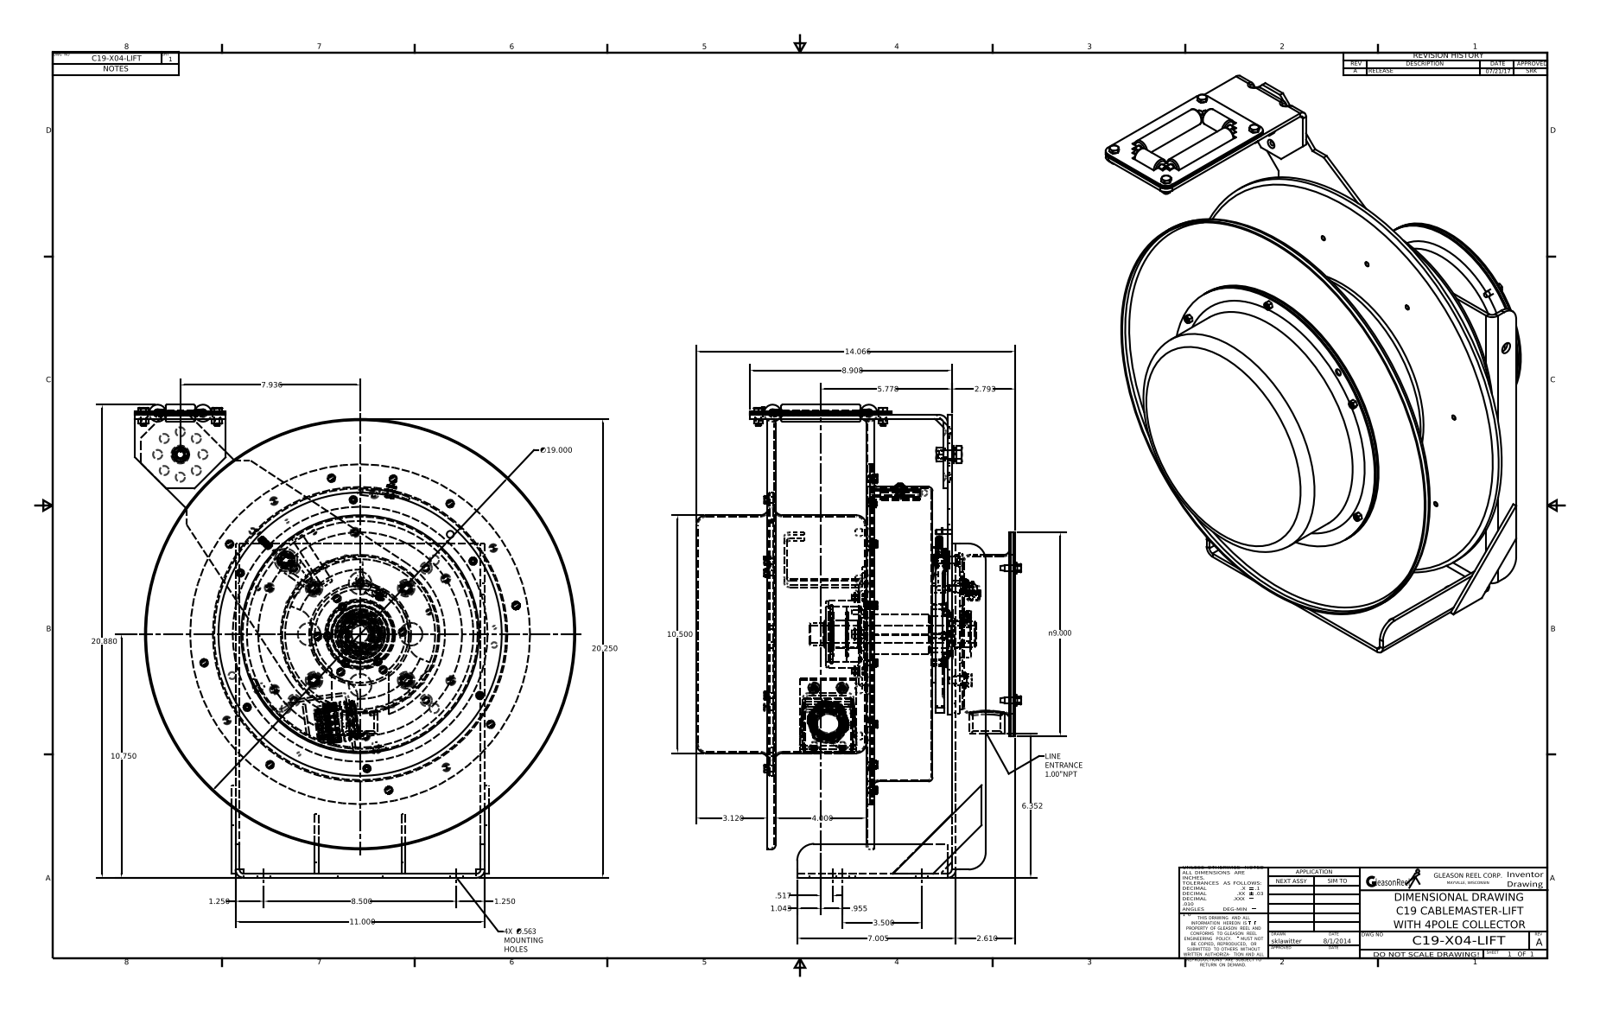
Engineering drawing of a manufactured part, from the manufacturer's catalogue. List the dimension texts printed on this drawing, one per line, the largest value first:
20.880
20.250
∅19.000
14.066
11.000
10.750
10.500
n9.000
8.908
8.500
7.936
7.005
6.352
5.778
4.000
3.500
3.120
2.793
2.610
1.250
1.250
1.043
.955
.517
